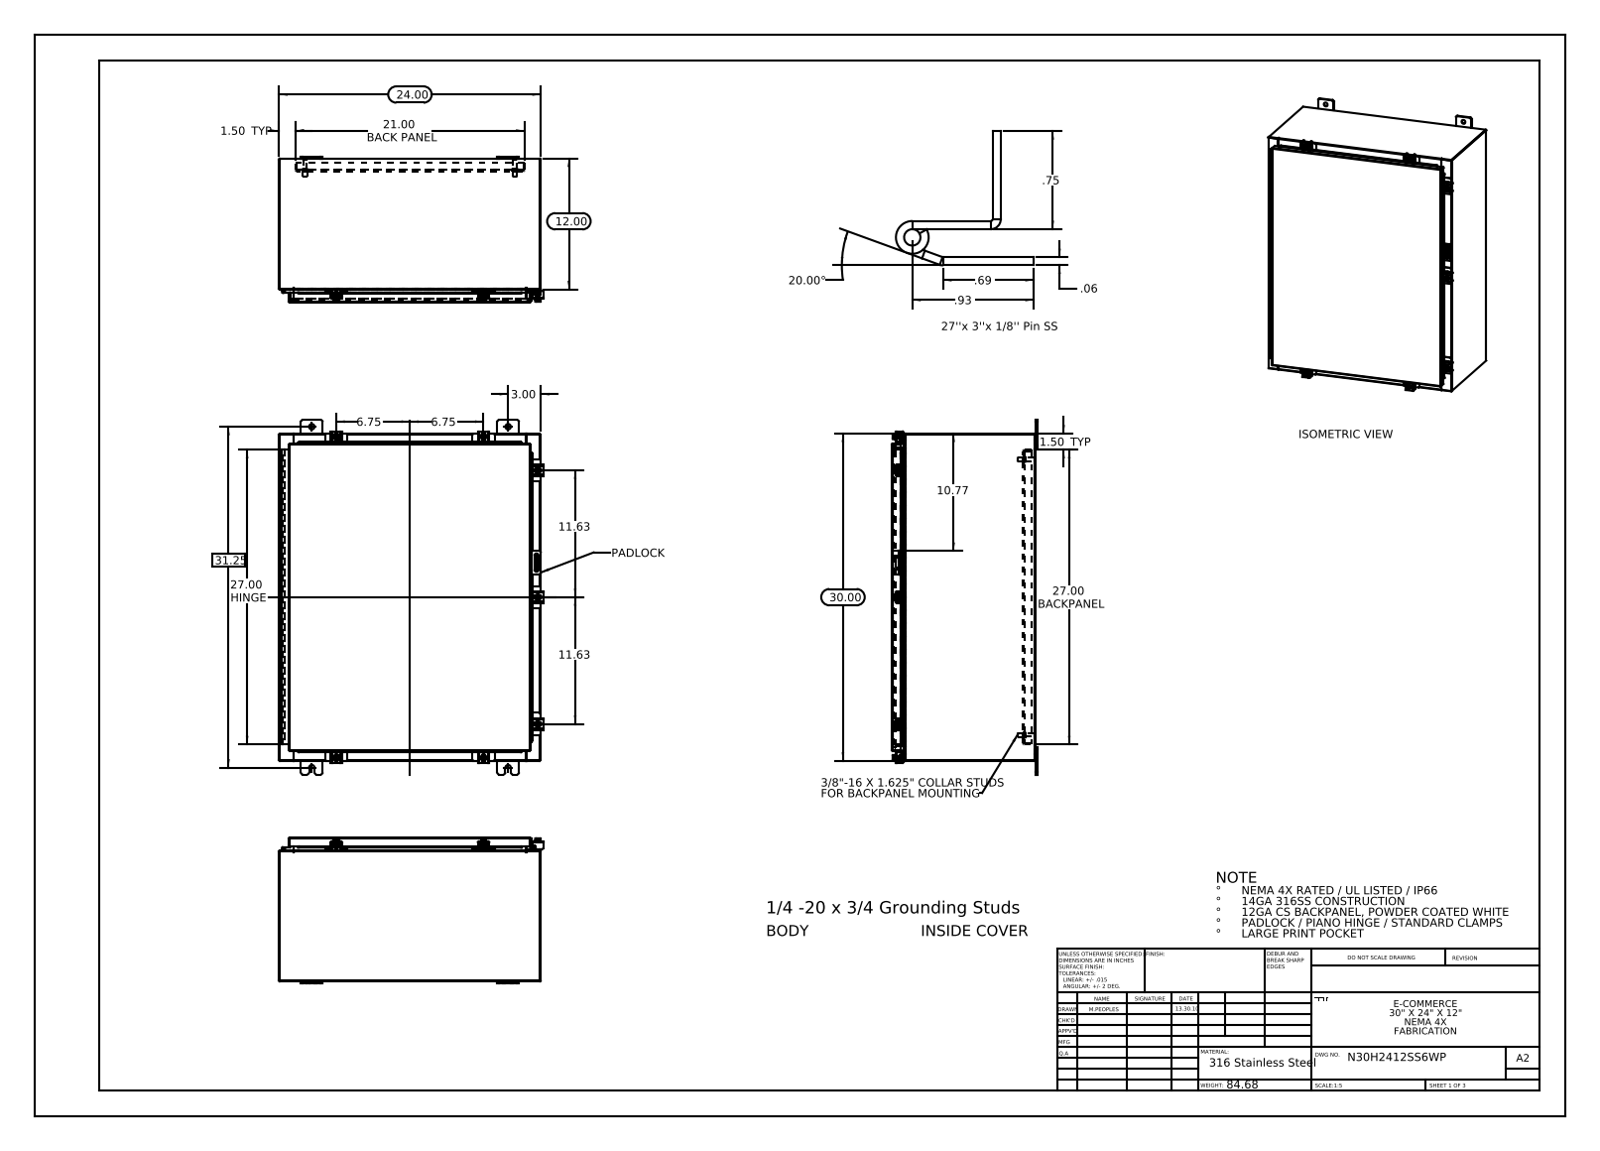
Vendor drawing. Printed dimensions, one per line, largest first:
31.25
30.00
27.00 HINGE
27.00 BACKPANEL
24.00
21.00 BACK PANEL
20.00°
12.00
11.63
11.63
10.77
6.75
6.75
3.00
1.50 TYP
1.50 TYP
.93
.75
.69
.06
